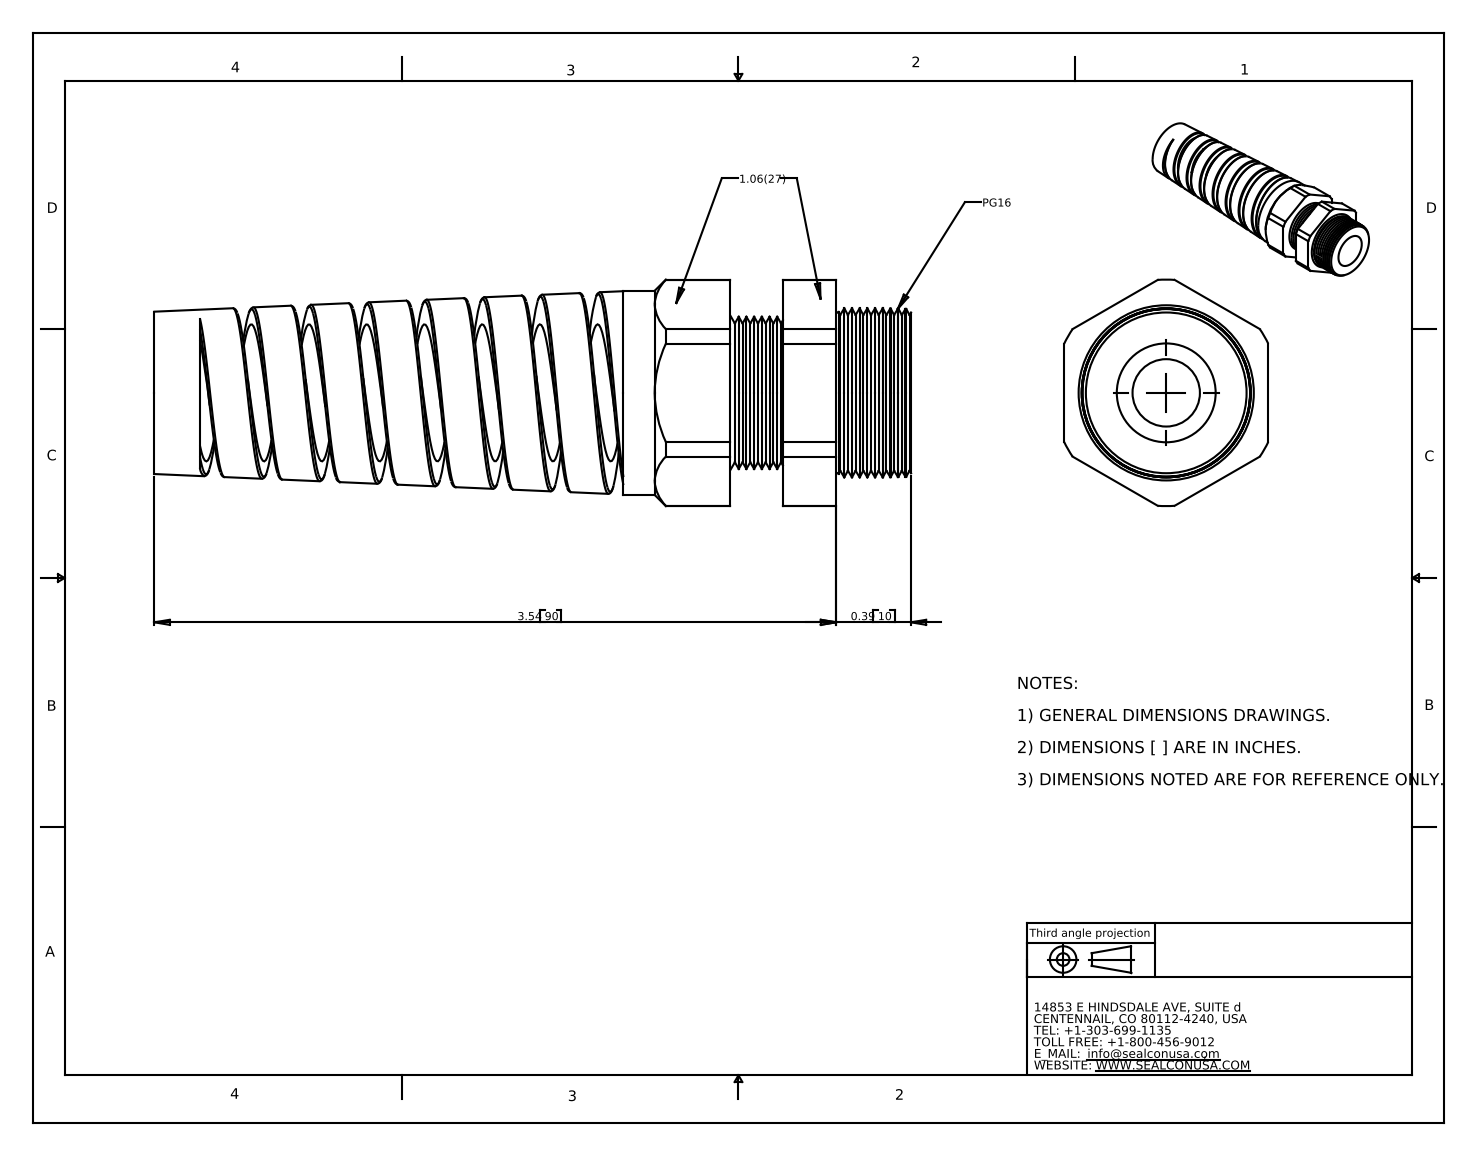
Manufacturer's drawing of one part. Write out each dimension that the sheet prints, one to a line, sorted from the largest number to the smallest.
3.54 90
0.39 10
